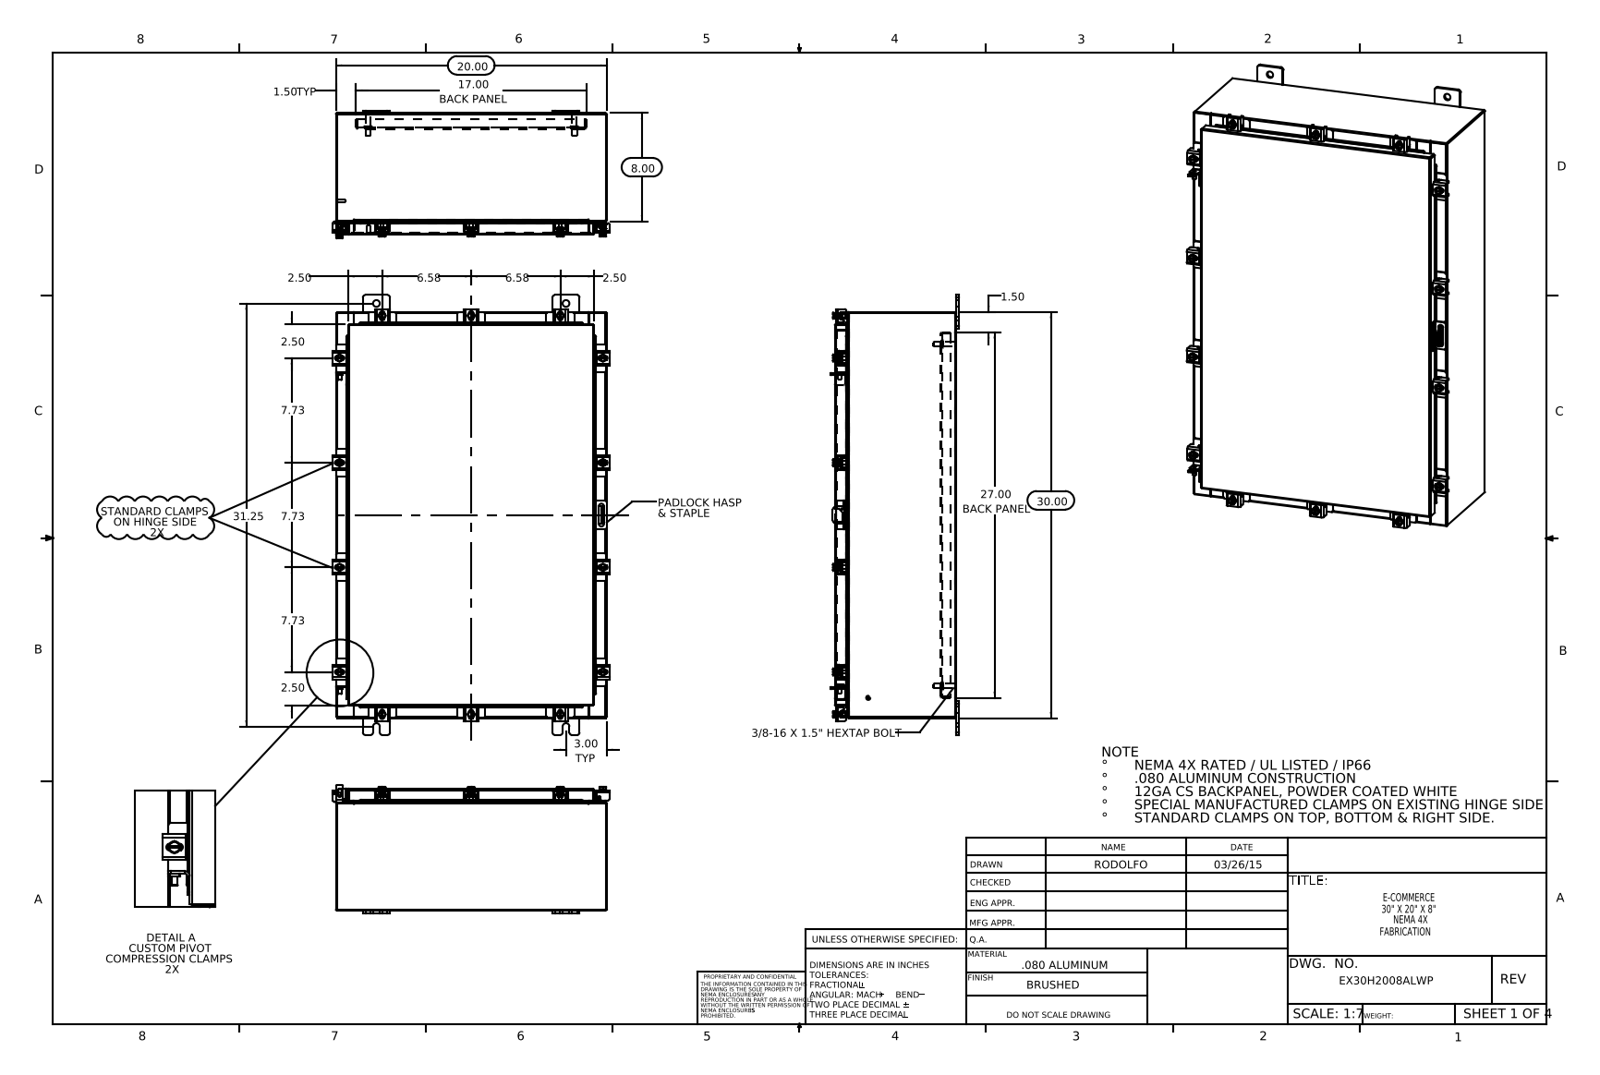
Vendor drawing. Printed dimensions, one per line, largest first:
31.25
30.00
27.00 BACK PANEL
20.00
17.00 BACK PANEL
8.00
7.73
7.73
7.73
6.58
6.58
3.00 TYP
2.50
2.50
2.50
2.50
1.50 TYP
1.50
